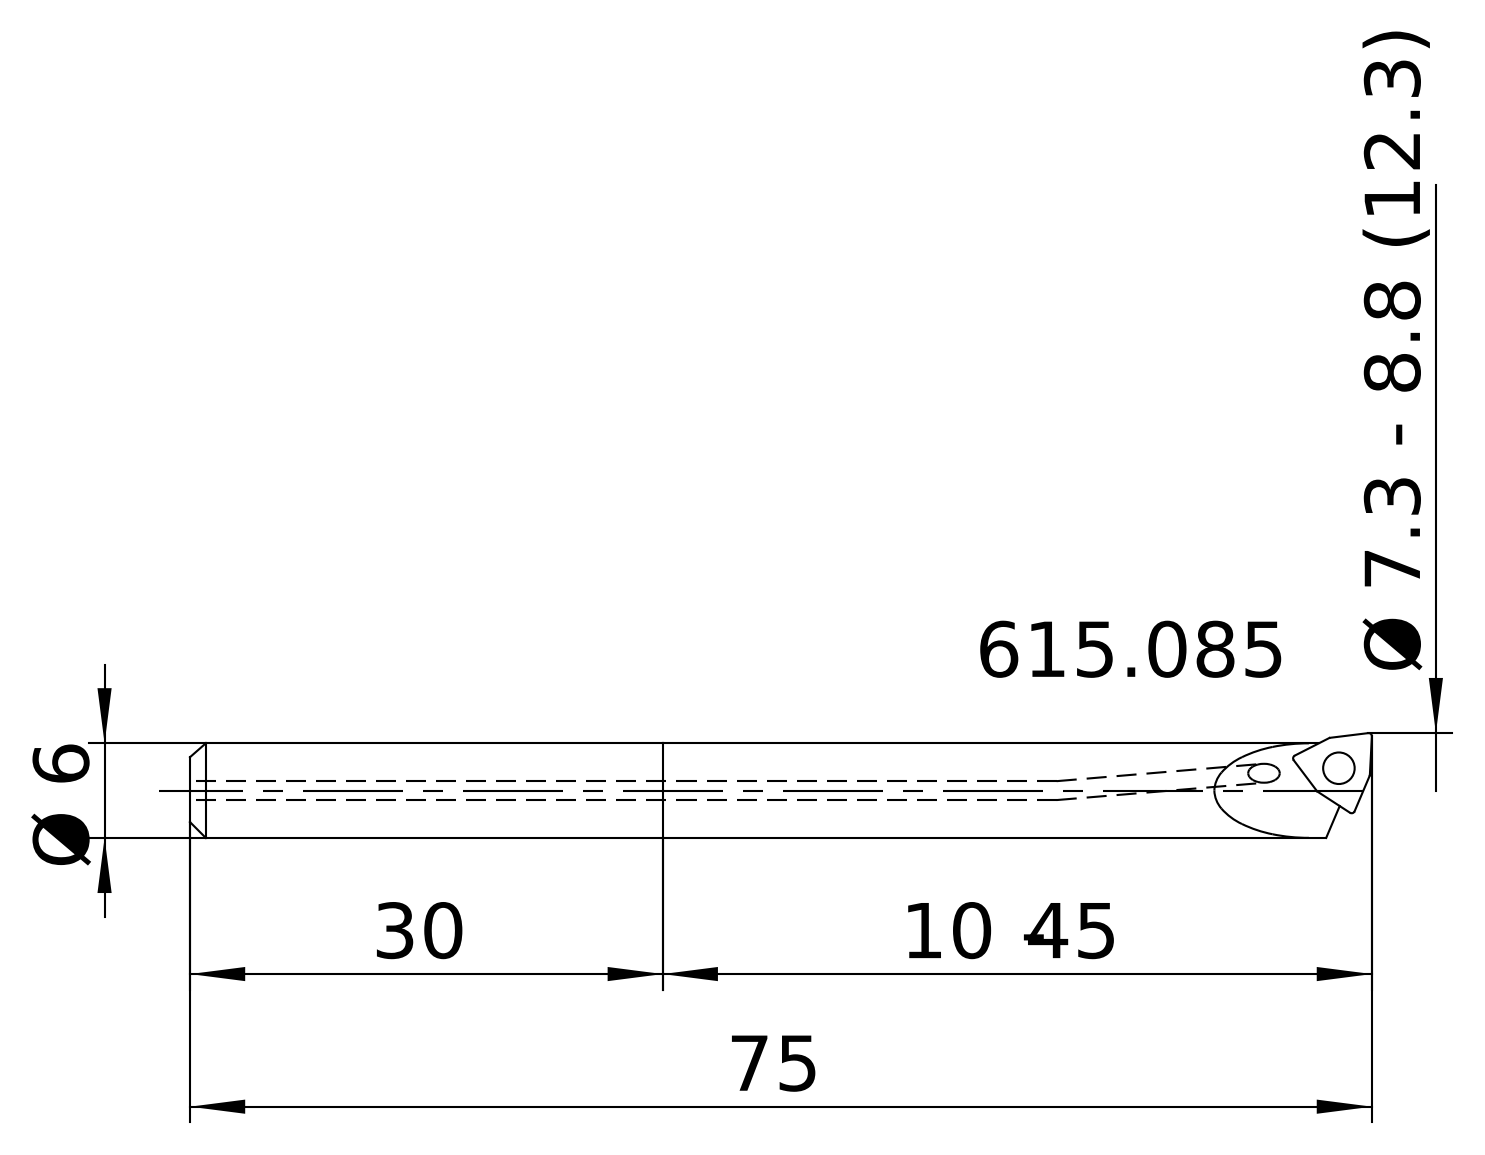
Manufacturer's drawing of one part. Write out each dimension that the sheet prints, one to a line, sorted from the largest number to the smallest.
75
30
10 - 45
Ø 7.3 - 8.8 (12.3)
Ø 6
